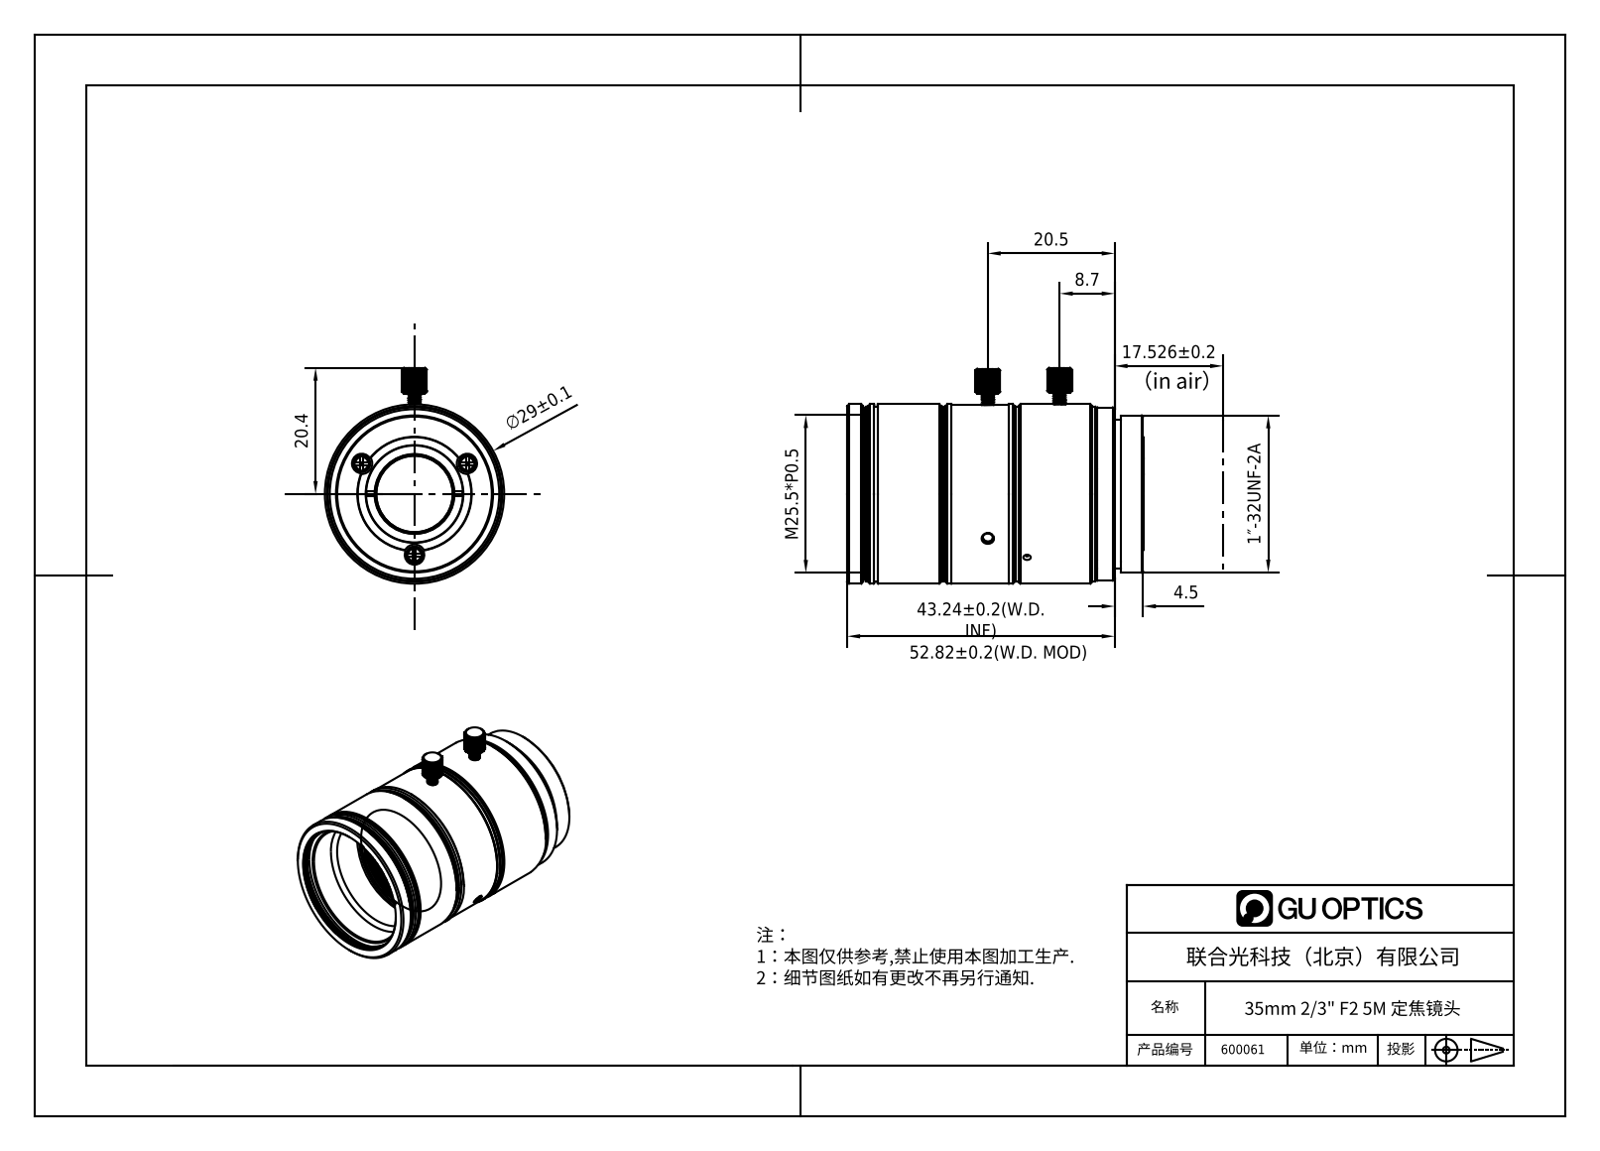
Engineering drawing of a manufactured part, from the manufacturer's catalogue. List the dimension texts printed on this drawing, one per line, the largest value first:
43.24±0.2(W.D. INF)
∅29±0.1
M25.5*P0.5
20.5
20.4
17.526±0.2
8.7
4.5
1″-32UNF-2A
